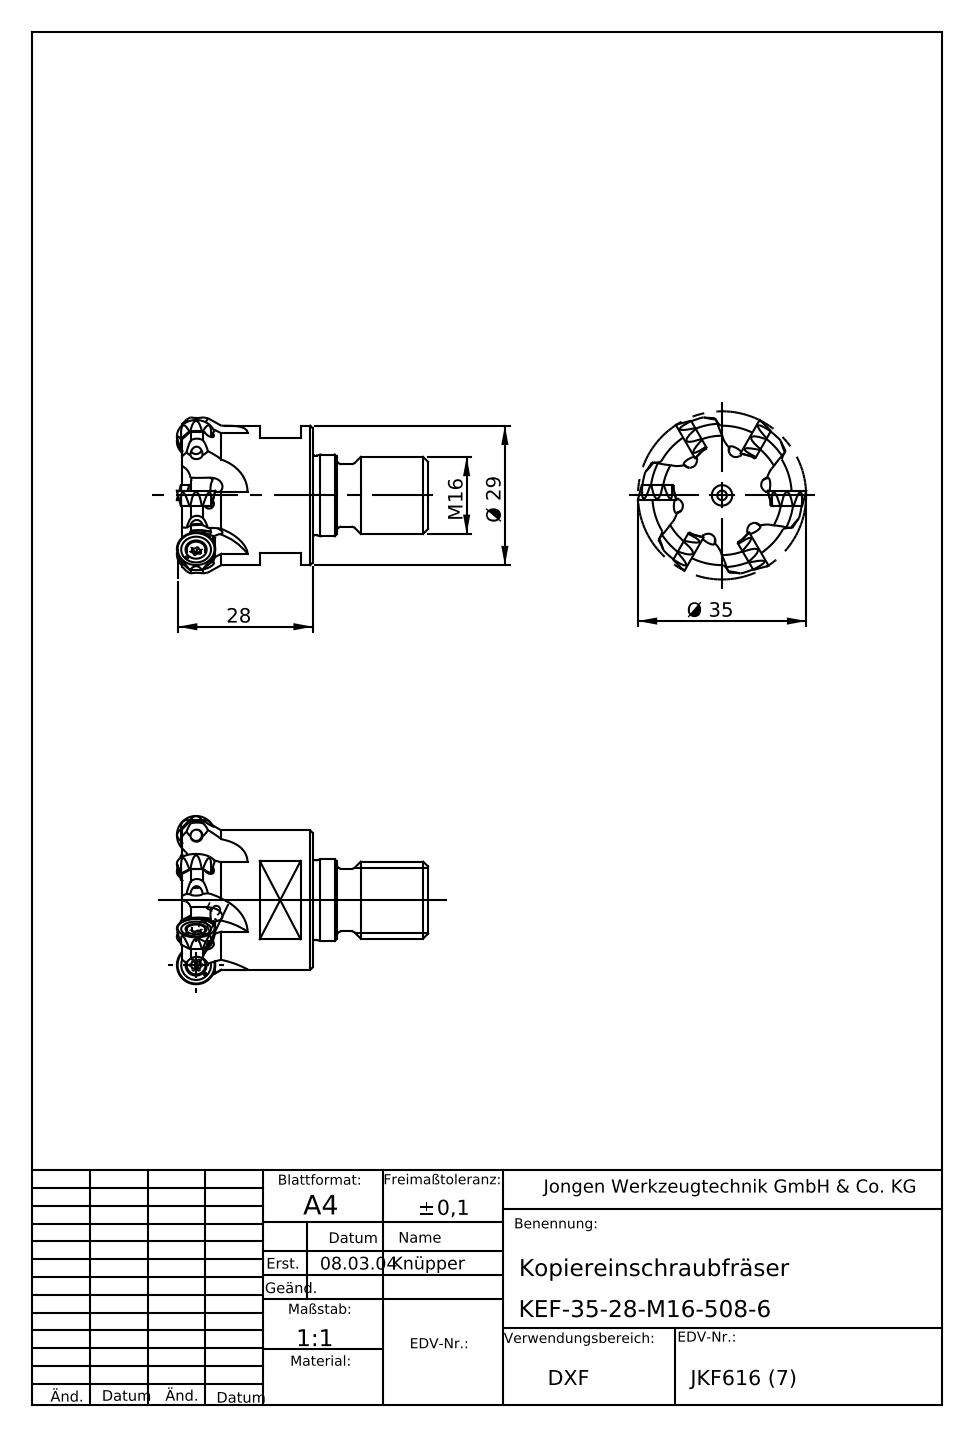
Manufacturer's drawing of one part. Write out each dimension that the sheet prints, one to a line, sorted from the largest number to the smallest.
Ø 35
Ø 29
28
M 16
R 2,5
